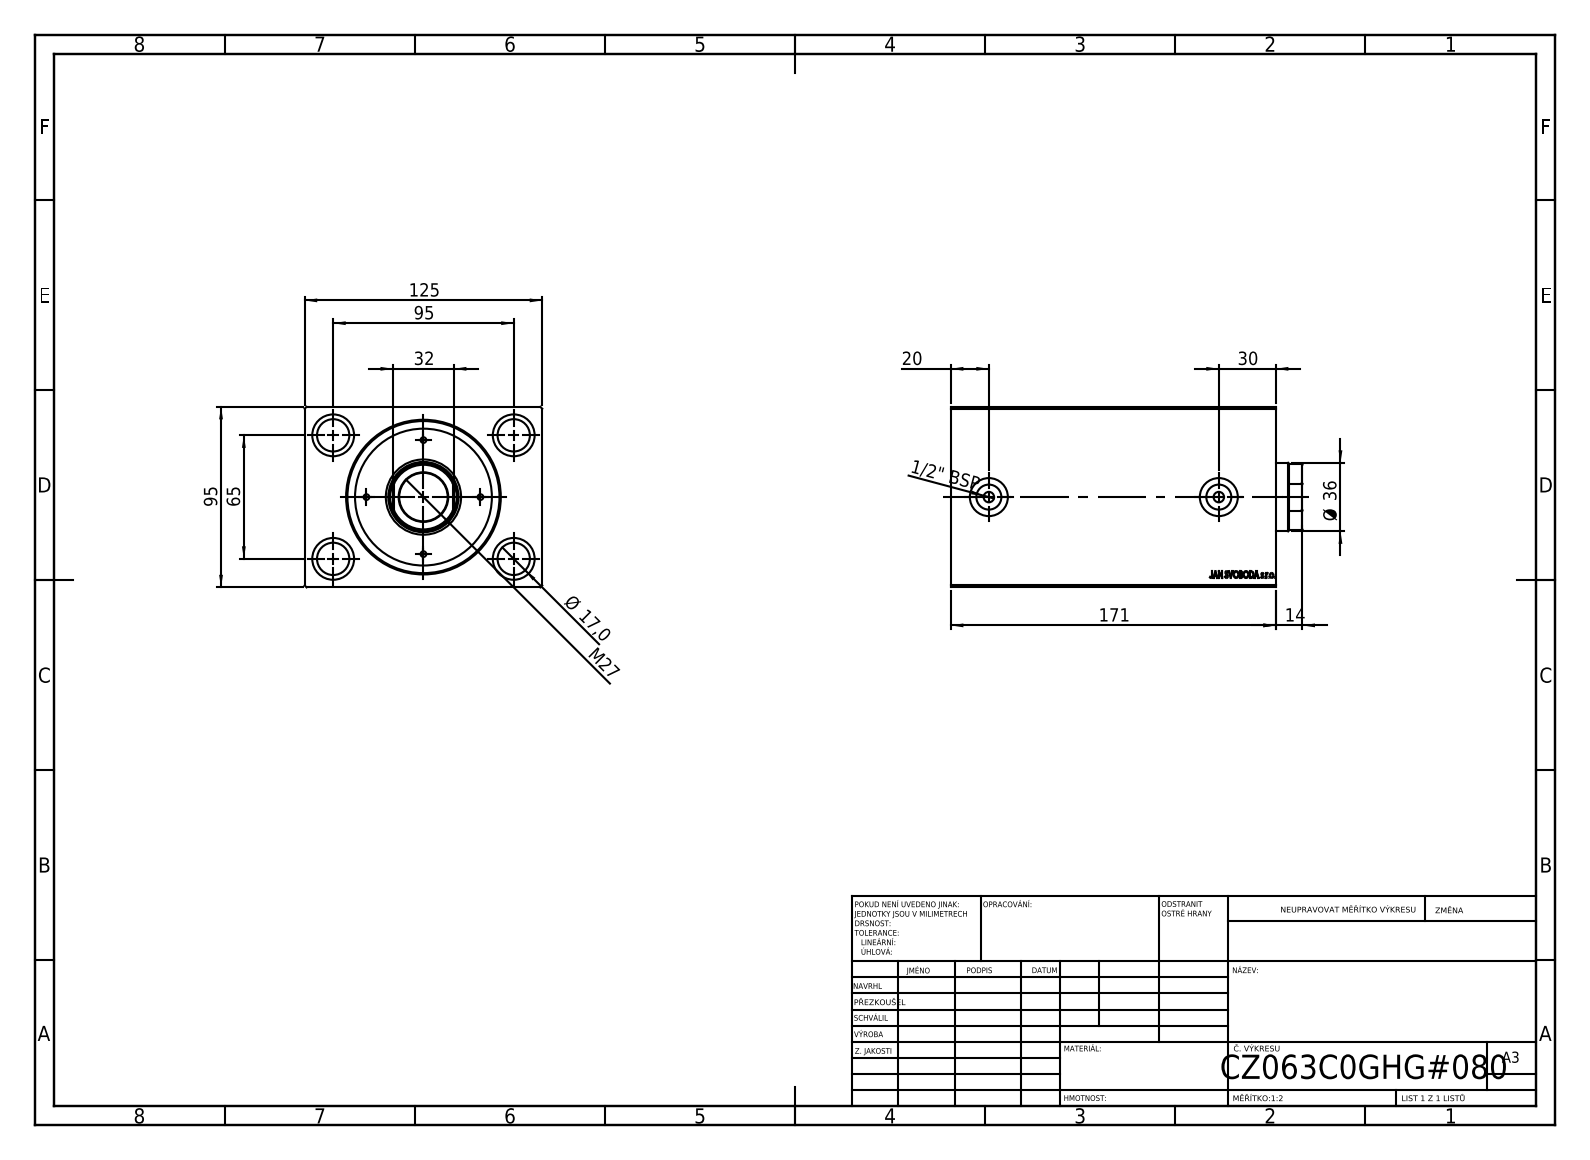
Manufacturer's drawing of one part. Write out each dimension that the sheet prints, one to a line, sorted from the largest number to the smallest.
171
125
95
95
65
Ø 36
32
30
M27
20
Ø 17,0
14
1/2" BSP
